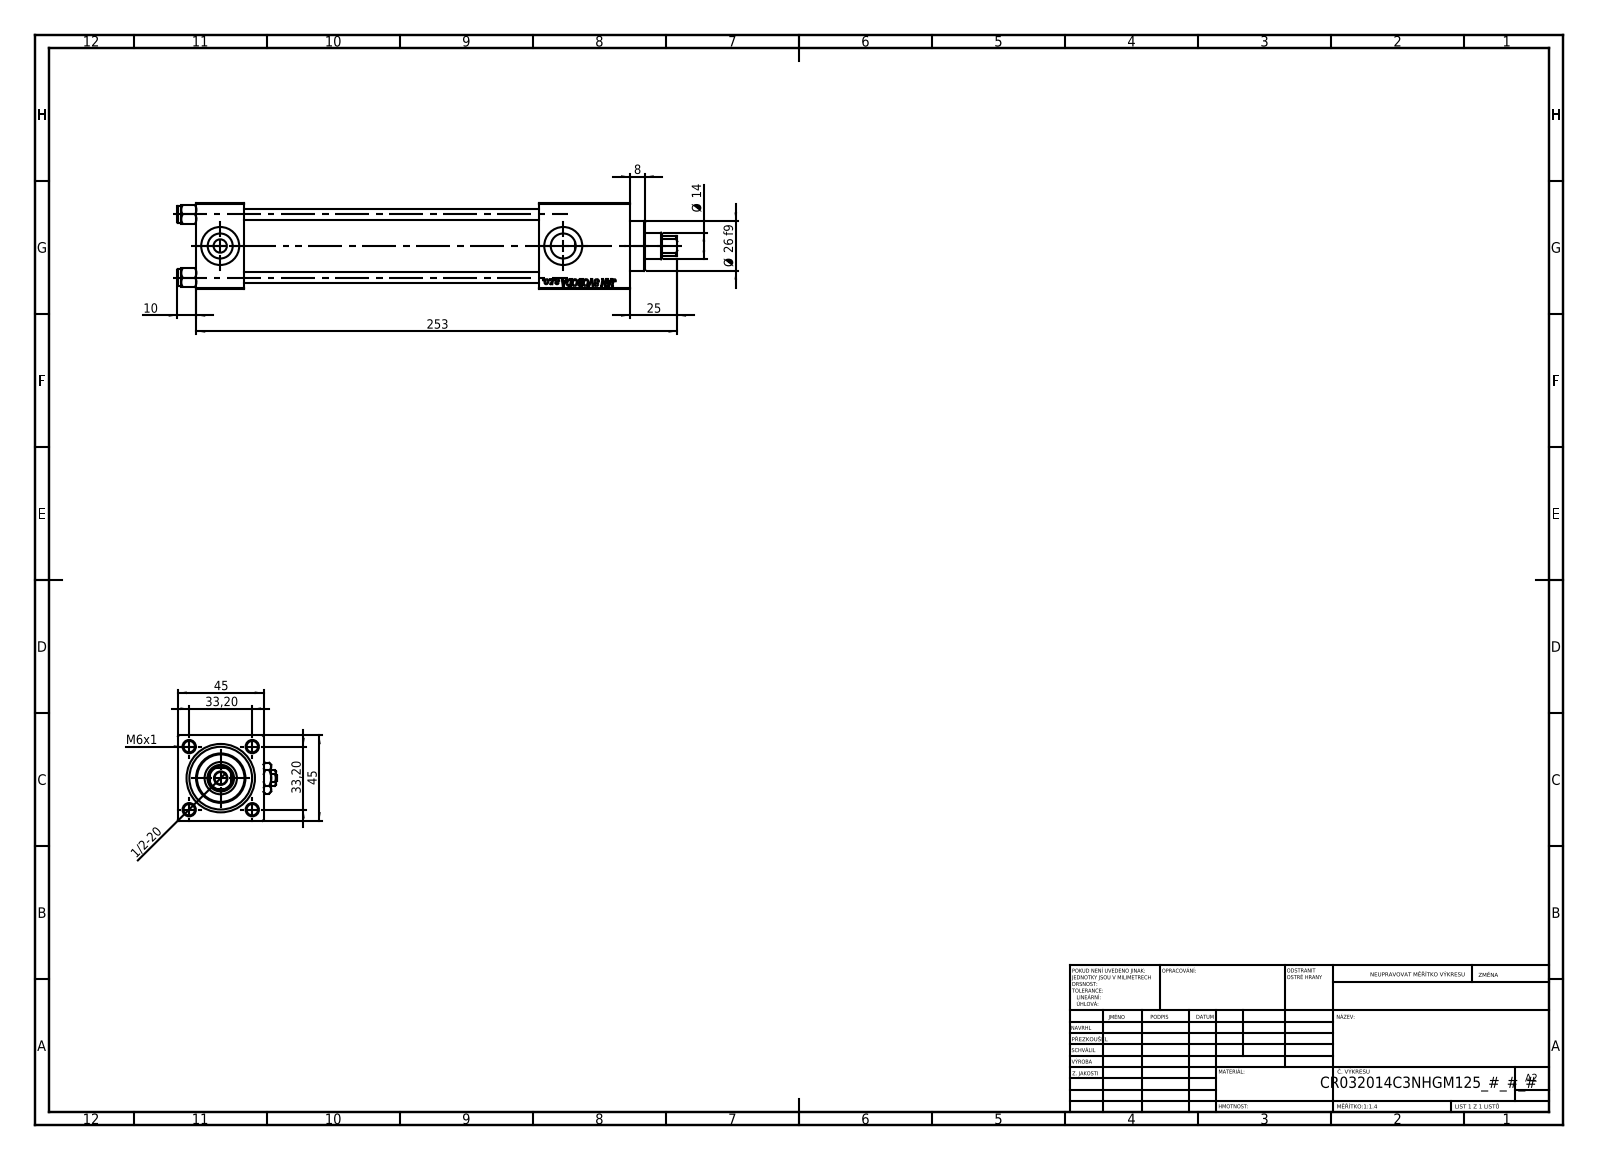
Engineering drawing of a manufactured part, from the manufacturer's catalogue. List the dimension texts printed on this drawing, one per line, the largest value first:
253
45
45
33,20
33,20
Ø 26 f9
25
Ø 14
10
8
M6x1
1/2-20
